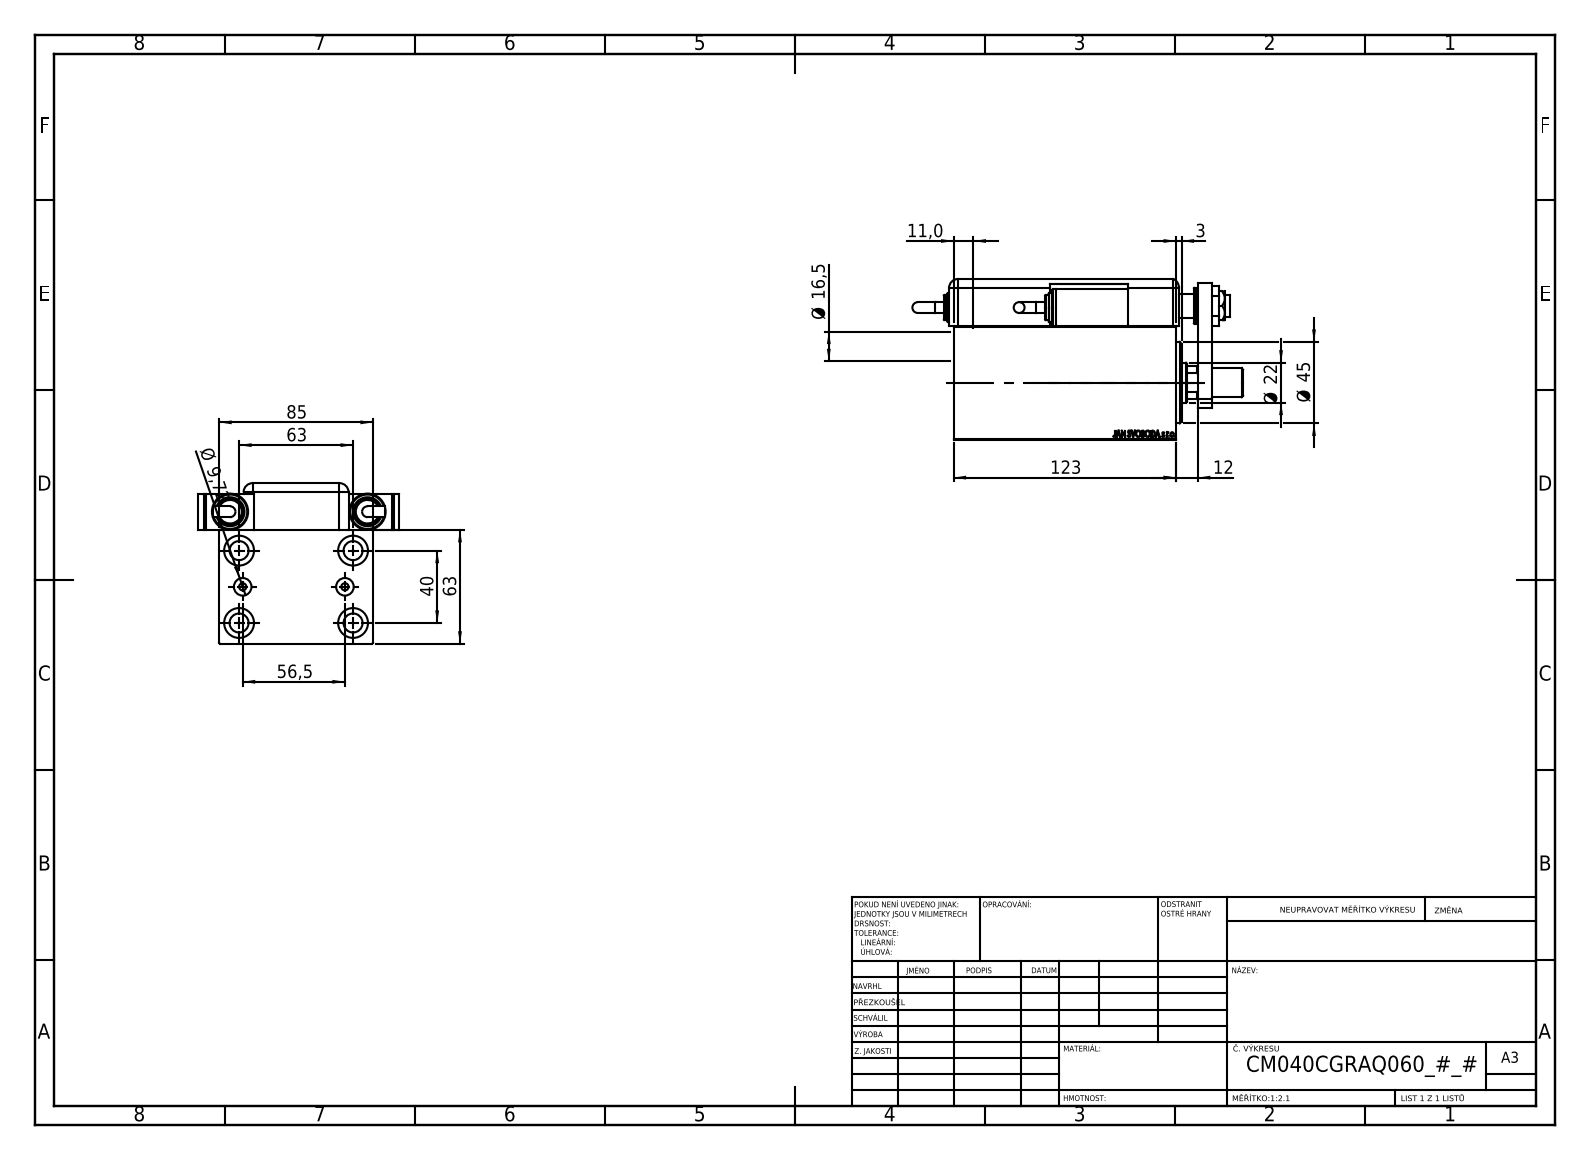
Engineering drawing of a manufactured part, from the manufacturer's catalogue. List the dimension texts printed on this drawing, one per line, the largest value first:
123
85
63
63
56,5
Ø 45
40
Ø 22
Ø 16,5
12
11,0
Ø 9,72
3
